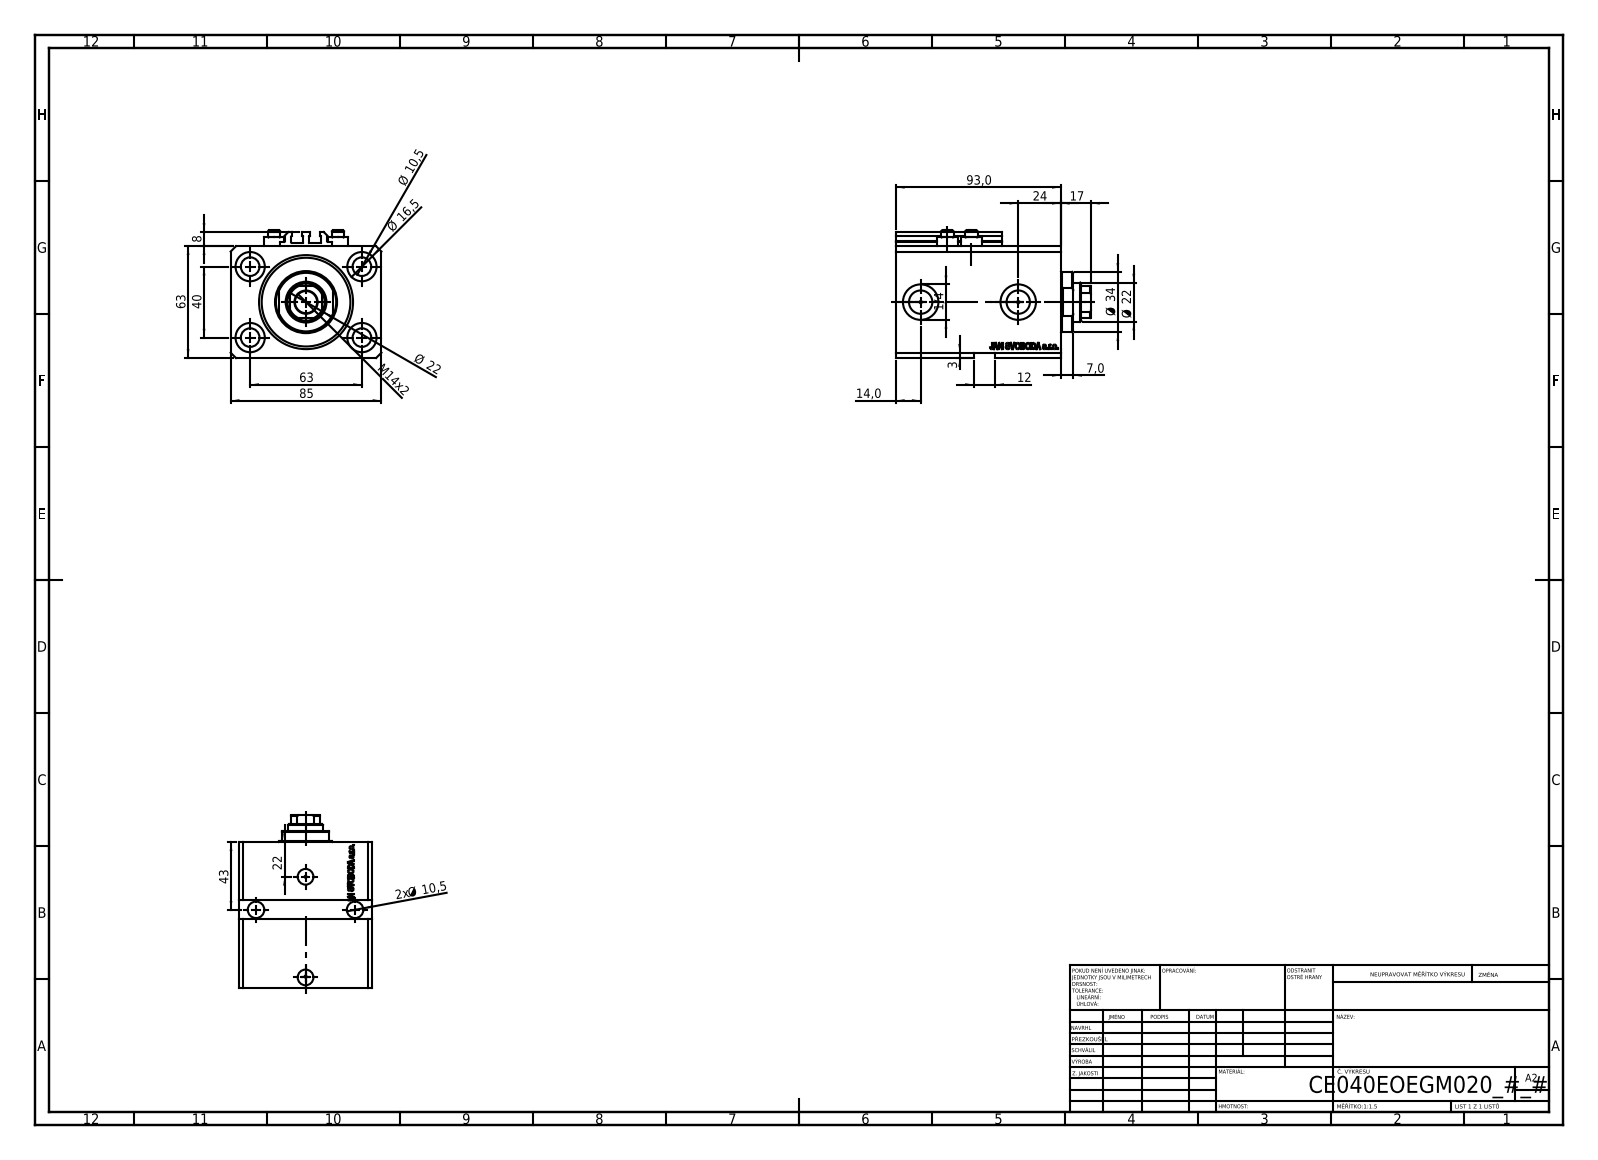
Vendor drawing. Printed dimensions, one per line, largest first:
93,0
85
63
63
43
40
Ø 34
24
Ø 22
Ø 22
22
17
Ø 16,5
M14x2
14,0
12
Ø 10,5
2x Ø 10,5
8
7,0
3
1/4
